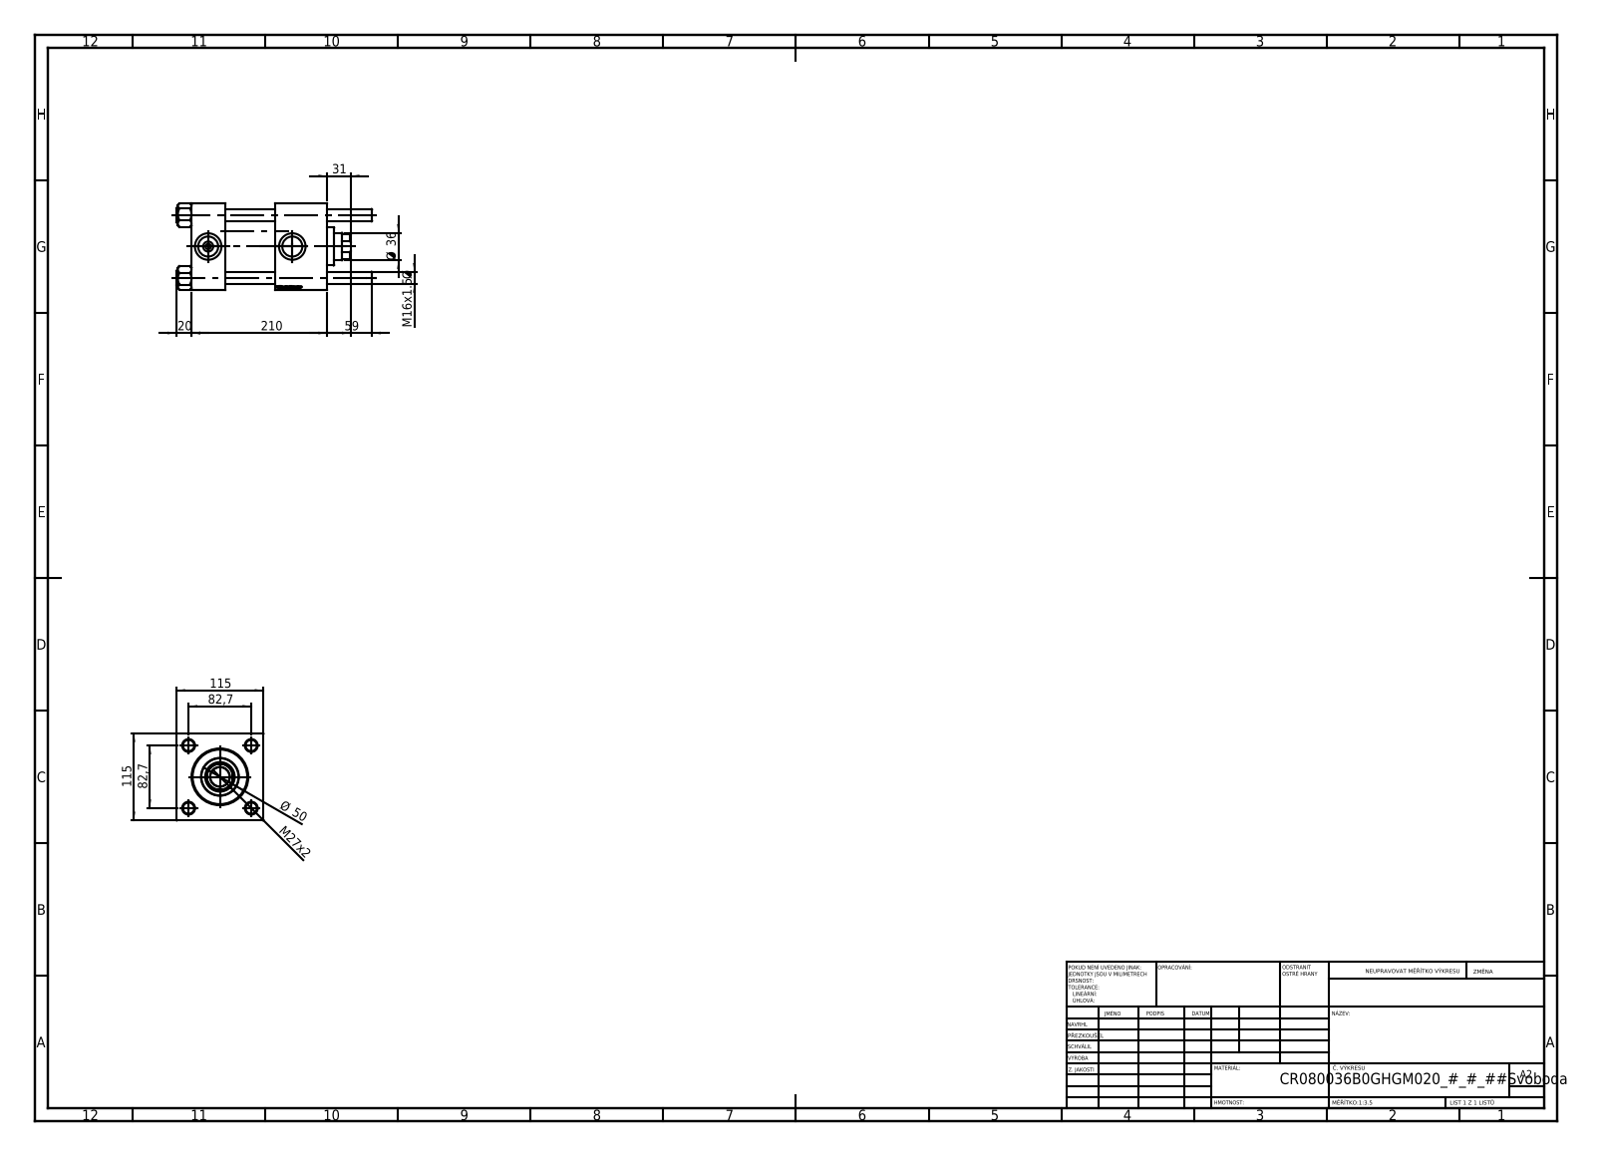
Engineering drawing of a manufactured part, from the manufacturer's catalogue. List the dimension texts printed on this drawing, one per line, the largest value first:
210
115
115
82,7
82,7
59
Ø 50
Ø 36
31
M27x2
20
M16x1.5 Ø
